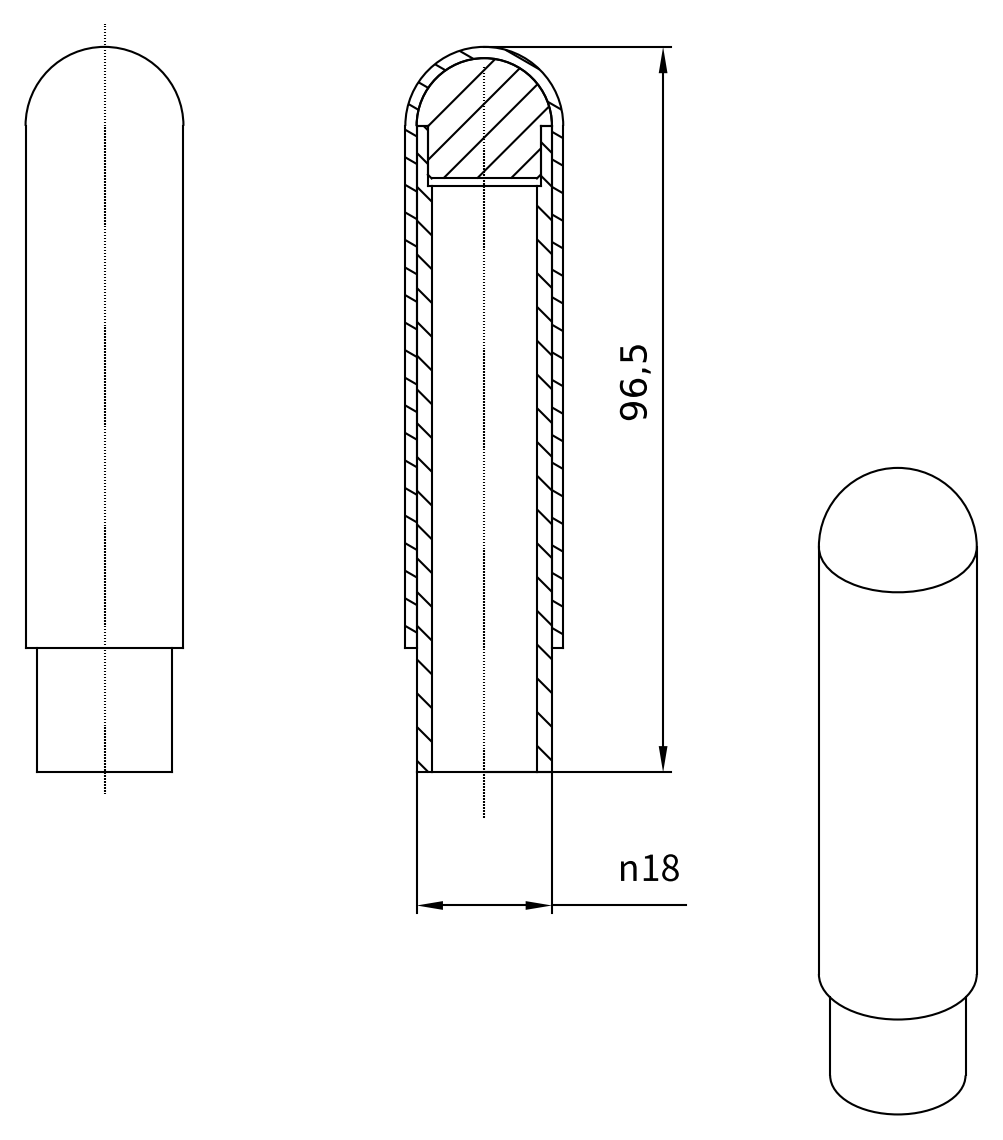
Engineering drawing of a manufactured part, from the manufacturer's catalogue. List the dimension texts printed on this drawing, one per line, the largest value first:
96,5
n18
